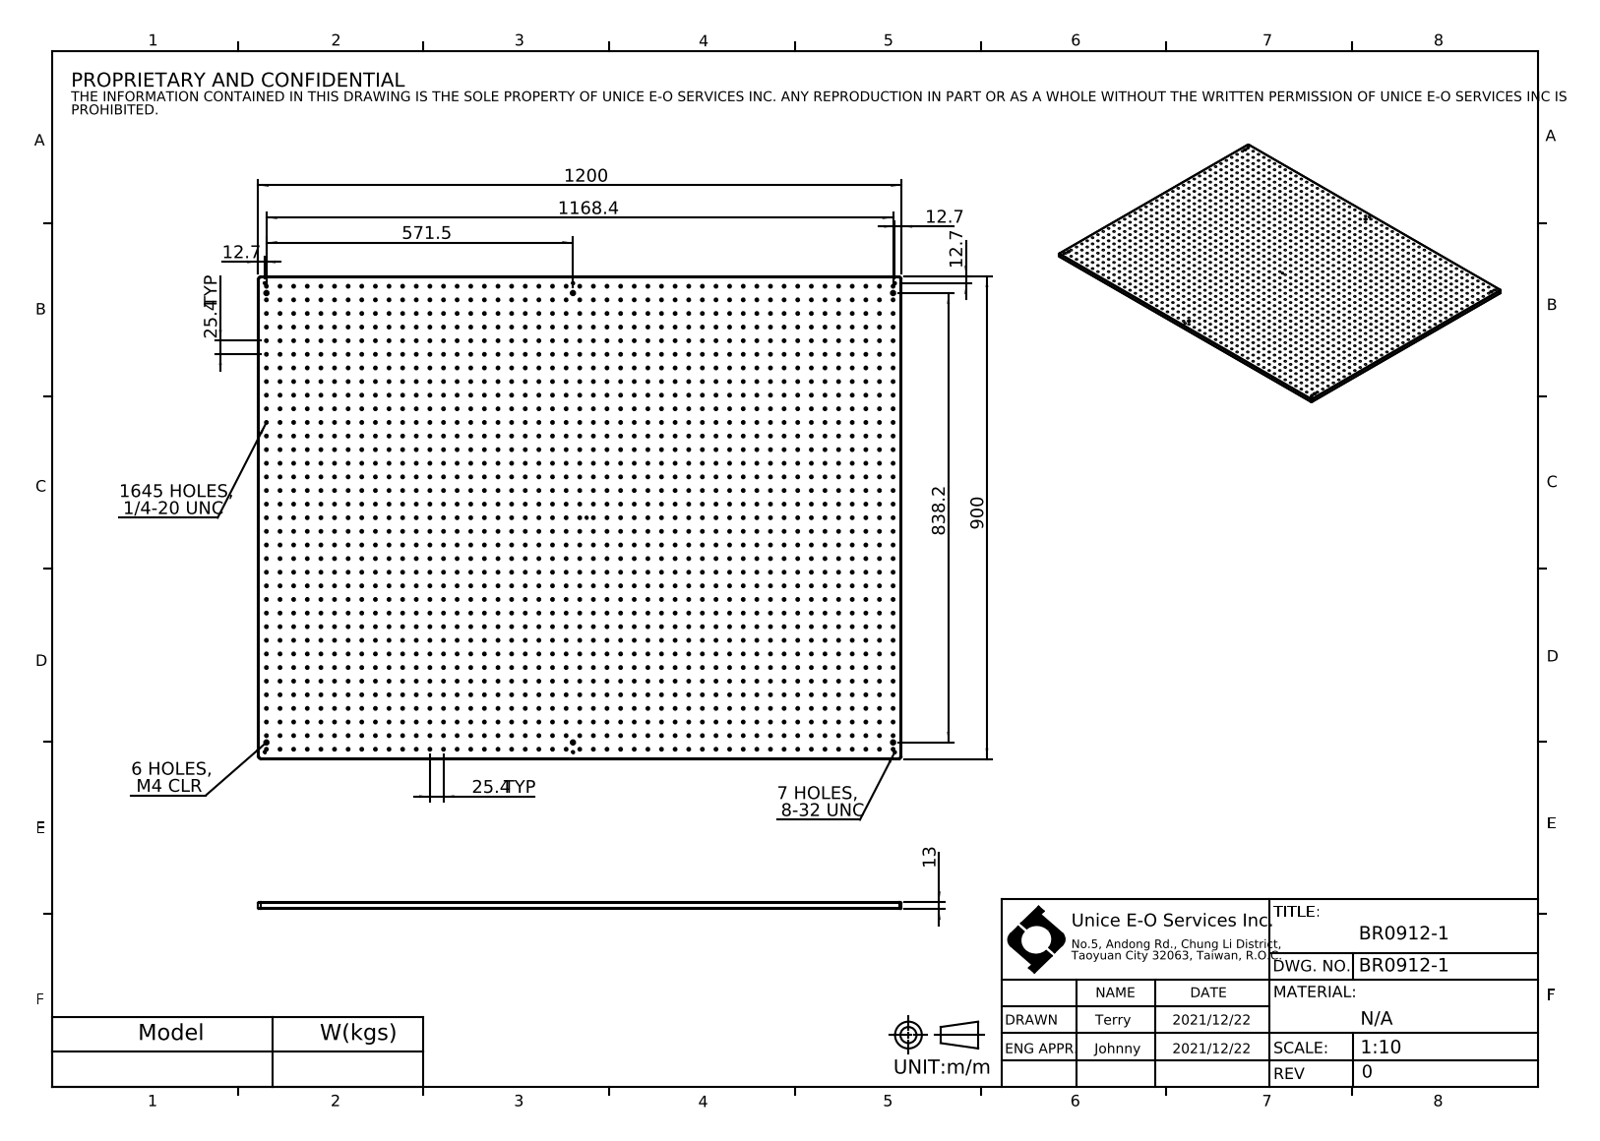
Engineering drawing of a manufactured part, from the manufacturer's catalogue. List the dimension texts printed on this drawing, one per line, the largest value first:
1645 HOLES, 1/4-20 UNC
1200
1168.4
900
838.2
571.5
25.4 TYP
25.4 TYP
13
12.7
12.7
12.7
7 HOLES, 8-32 UNC
